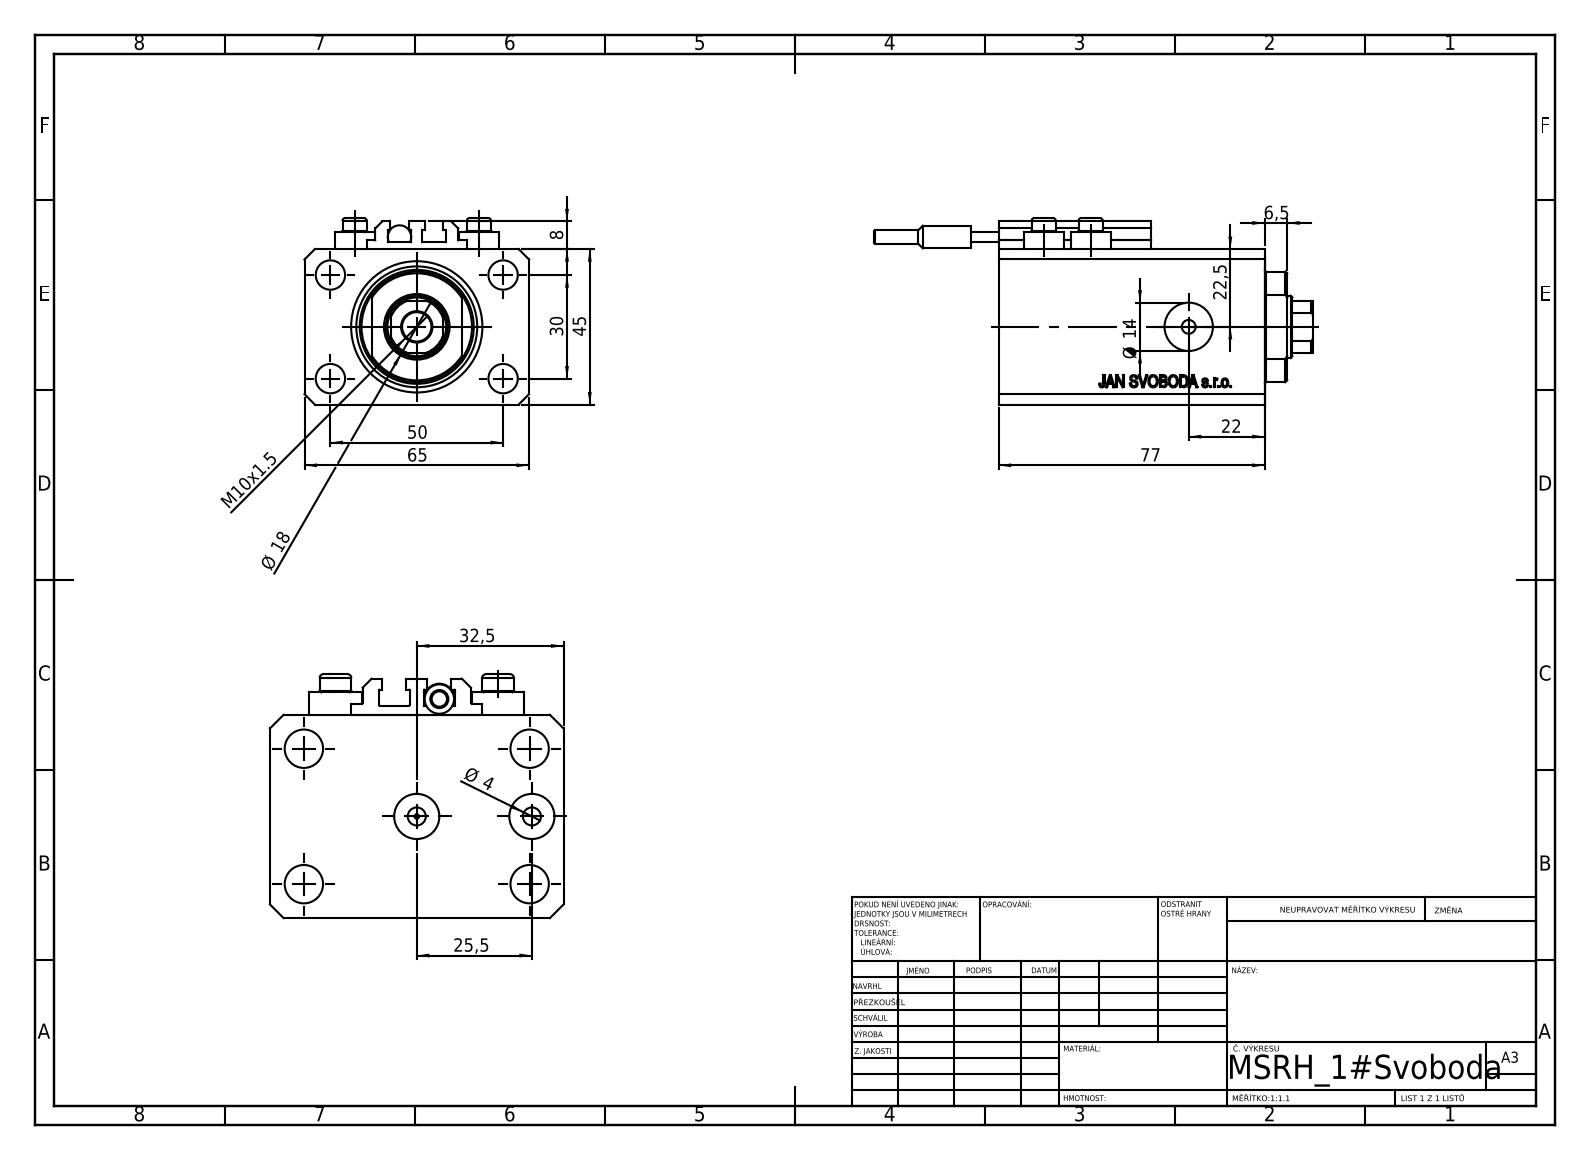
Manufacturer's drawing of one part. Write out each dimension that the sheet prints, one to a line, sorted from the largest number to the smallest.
77
65
50
45
32,5
30
25,5
22,5
22
Ø 18
Ø 14
M10x1.5
8
6,5
Ø 4
